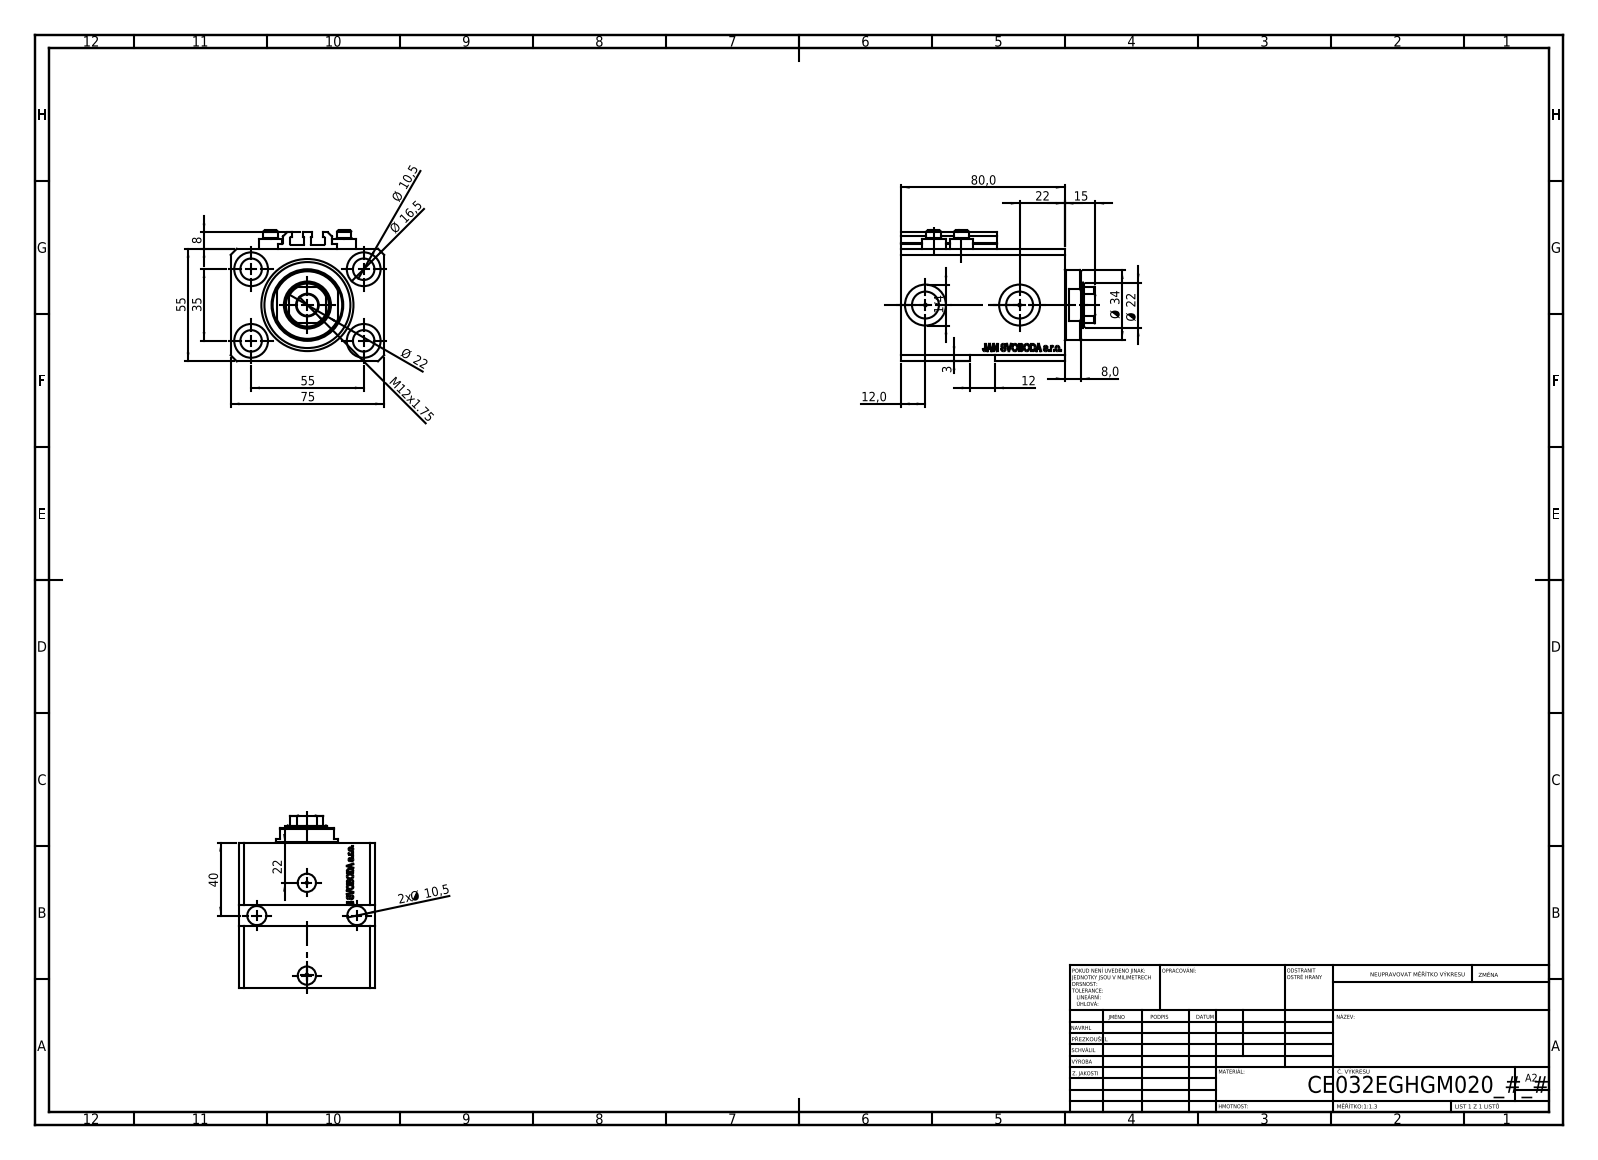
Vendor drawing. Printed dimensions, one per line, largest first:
80,0
75
55
55
40
35
Ø 34
Ø 22
22
Ø 22
22
Ø 16,5
15
M12x1.75
12,0
12
Ø 10,5
2x Ø 10,5
8
8,0
3
1/4
